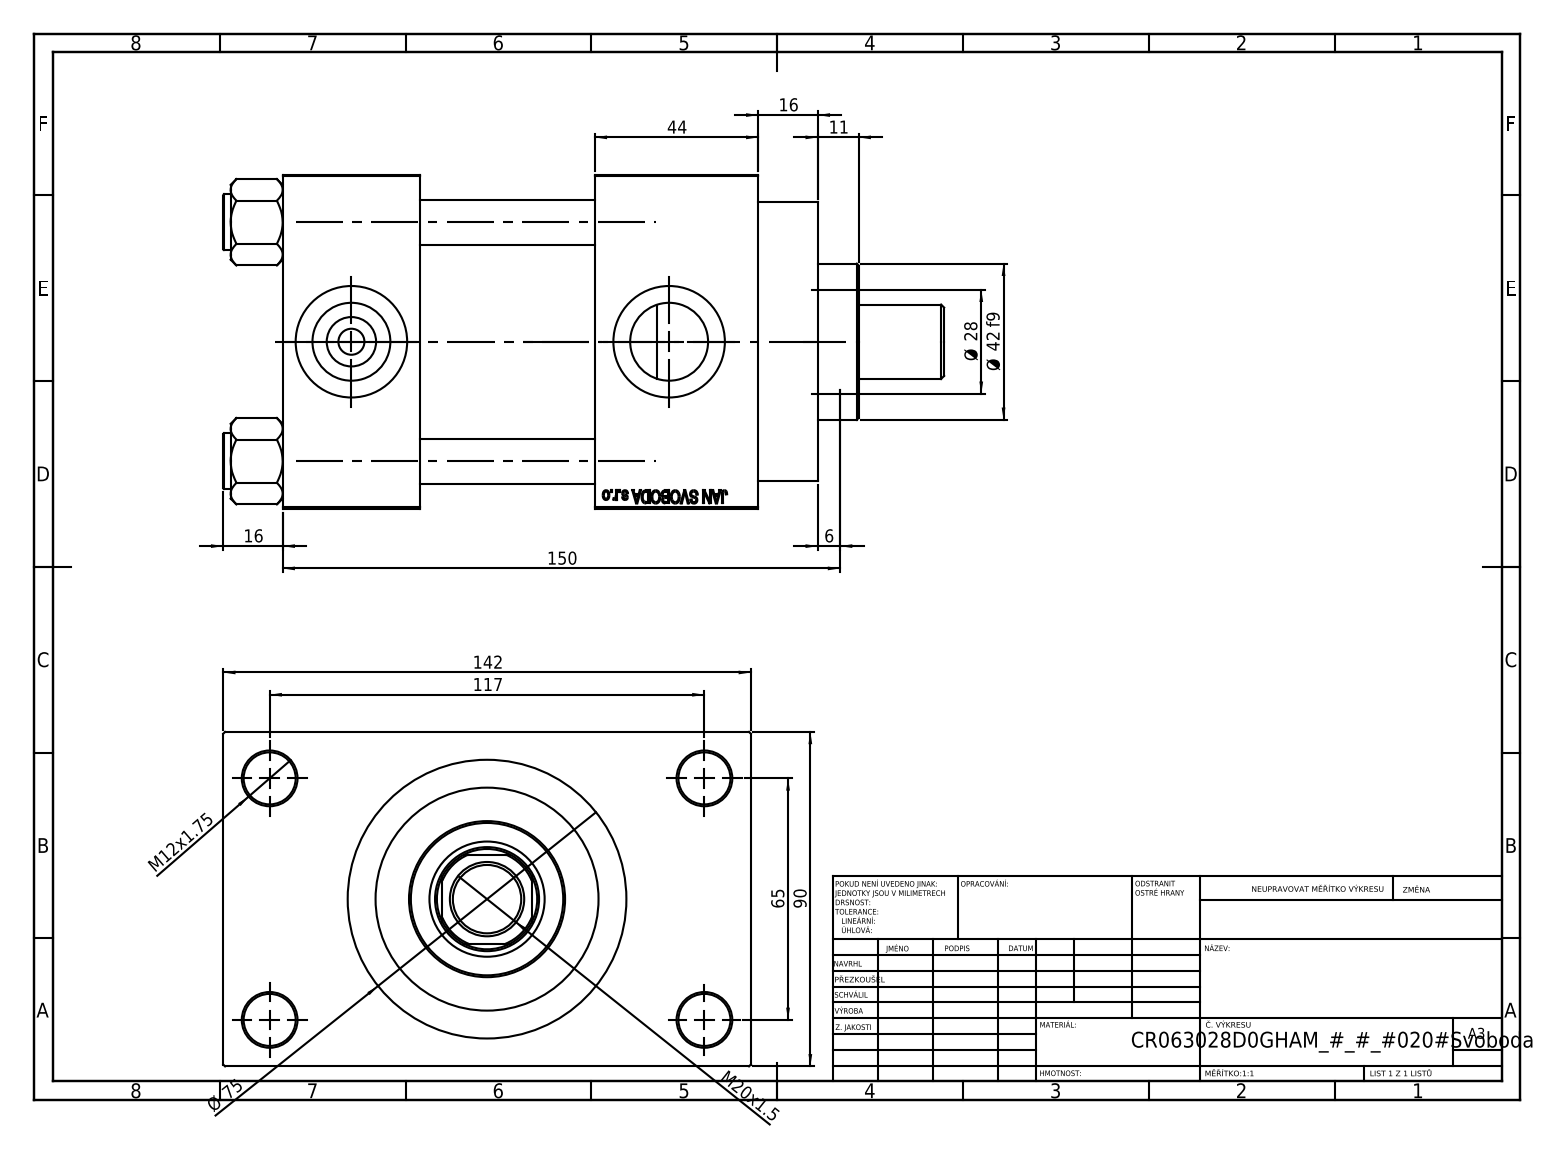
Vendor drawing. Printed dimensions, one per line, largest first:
150
142
117
90
Ø 75
65
44
Ø 42 f9
Ø 28
M20x1.5
16
16
M12x1.75
11
6
